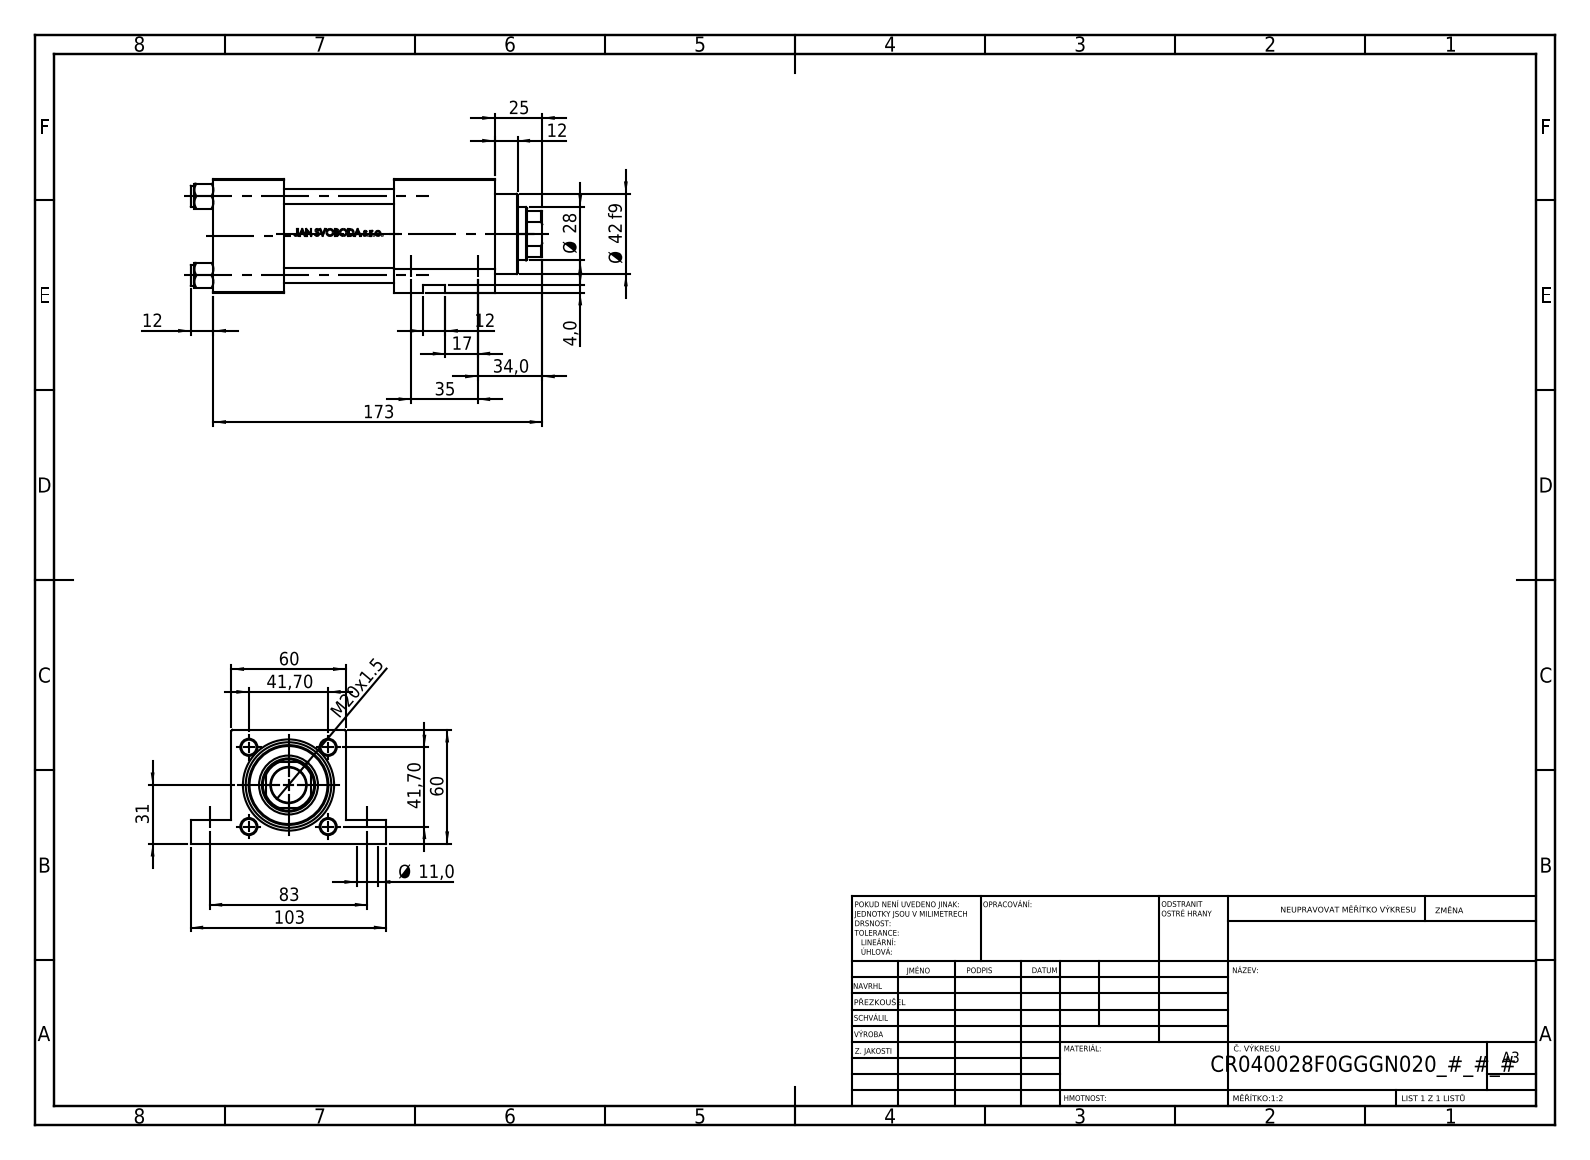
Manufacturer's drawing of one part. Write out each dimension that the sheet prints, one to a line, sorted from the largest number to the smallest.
173
103
83
60
60
Ø 42 f9
41,70
41,70
35
34,0
31
Ø 28
25
M20x1.5
17
12
12
12
Ø 11,0
4,0
